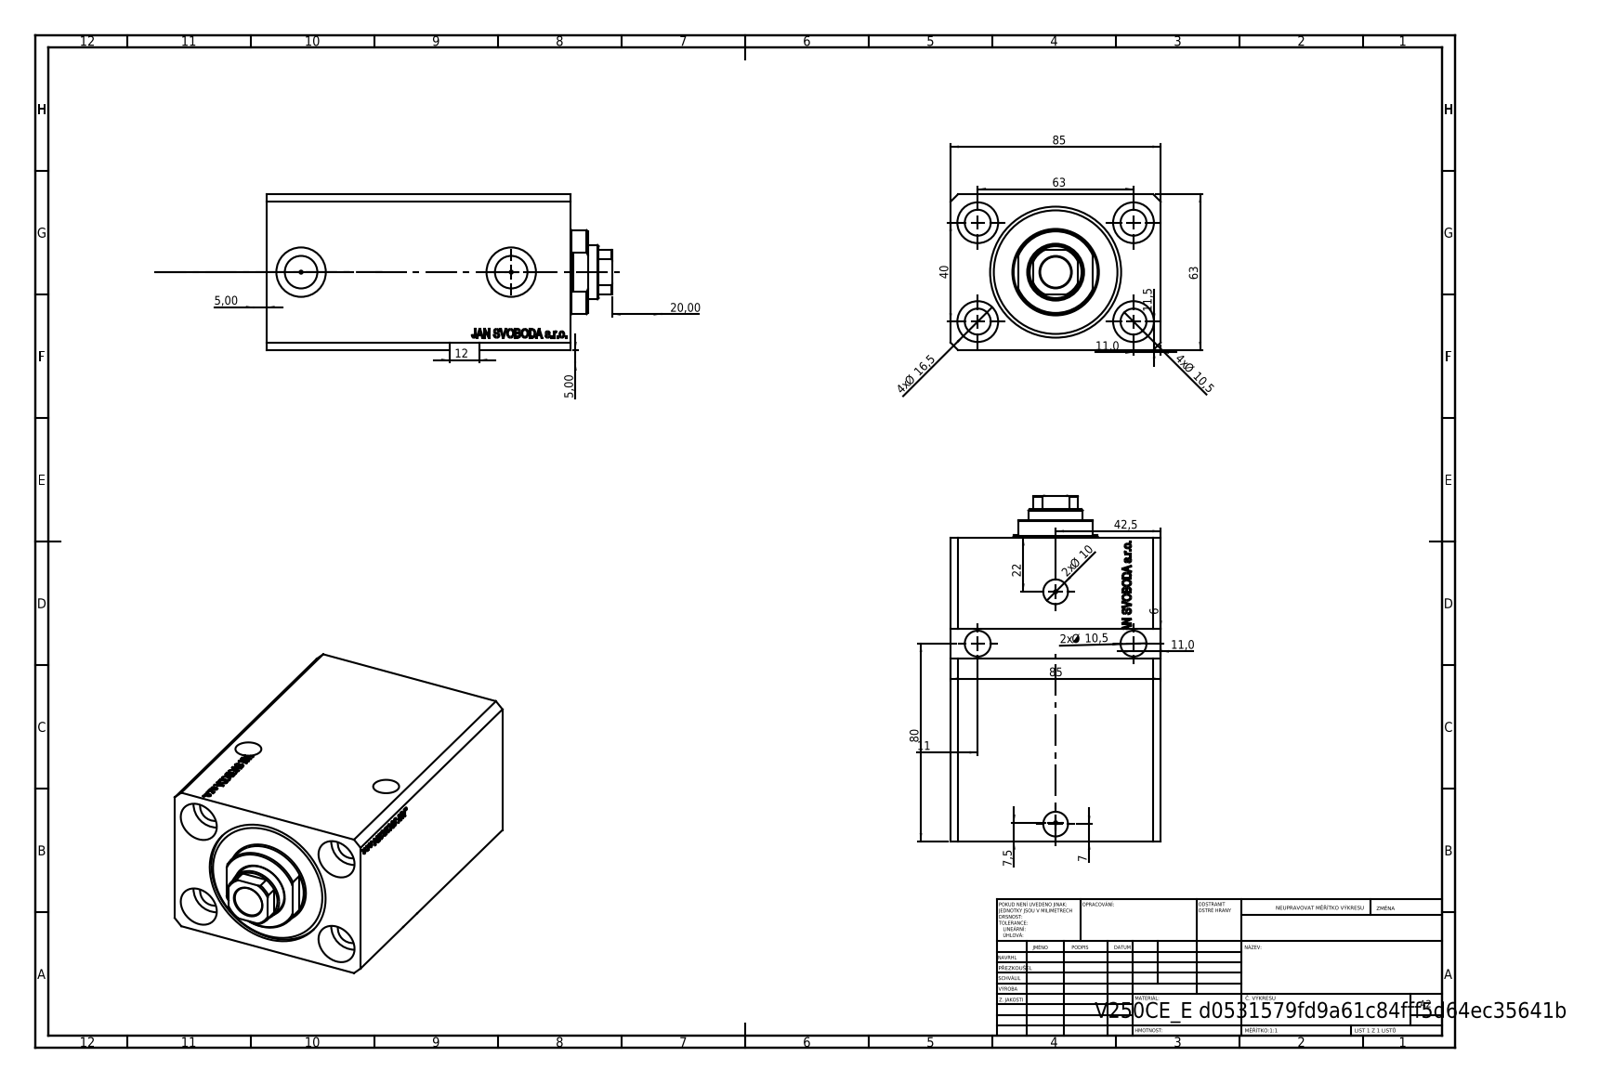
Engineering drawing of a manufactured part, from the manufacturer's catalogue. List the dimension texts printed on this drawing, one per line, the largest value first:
85
85
80
63
63
42,5
40
22
20,00
4x Ø 16,5
12
11,5
11,0
11,0
11
4x Ø 10,5
2x Ø 10,5
2x Ø 10
7,5
7
6
5,00
5,00
